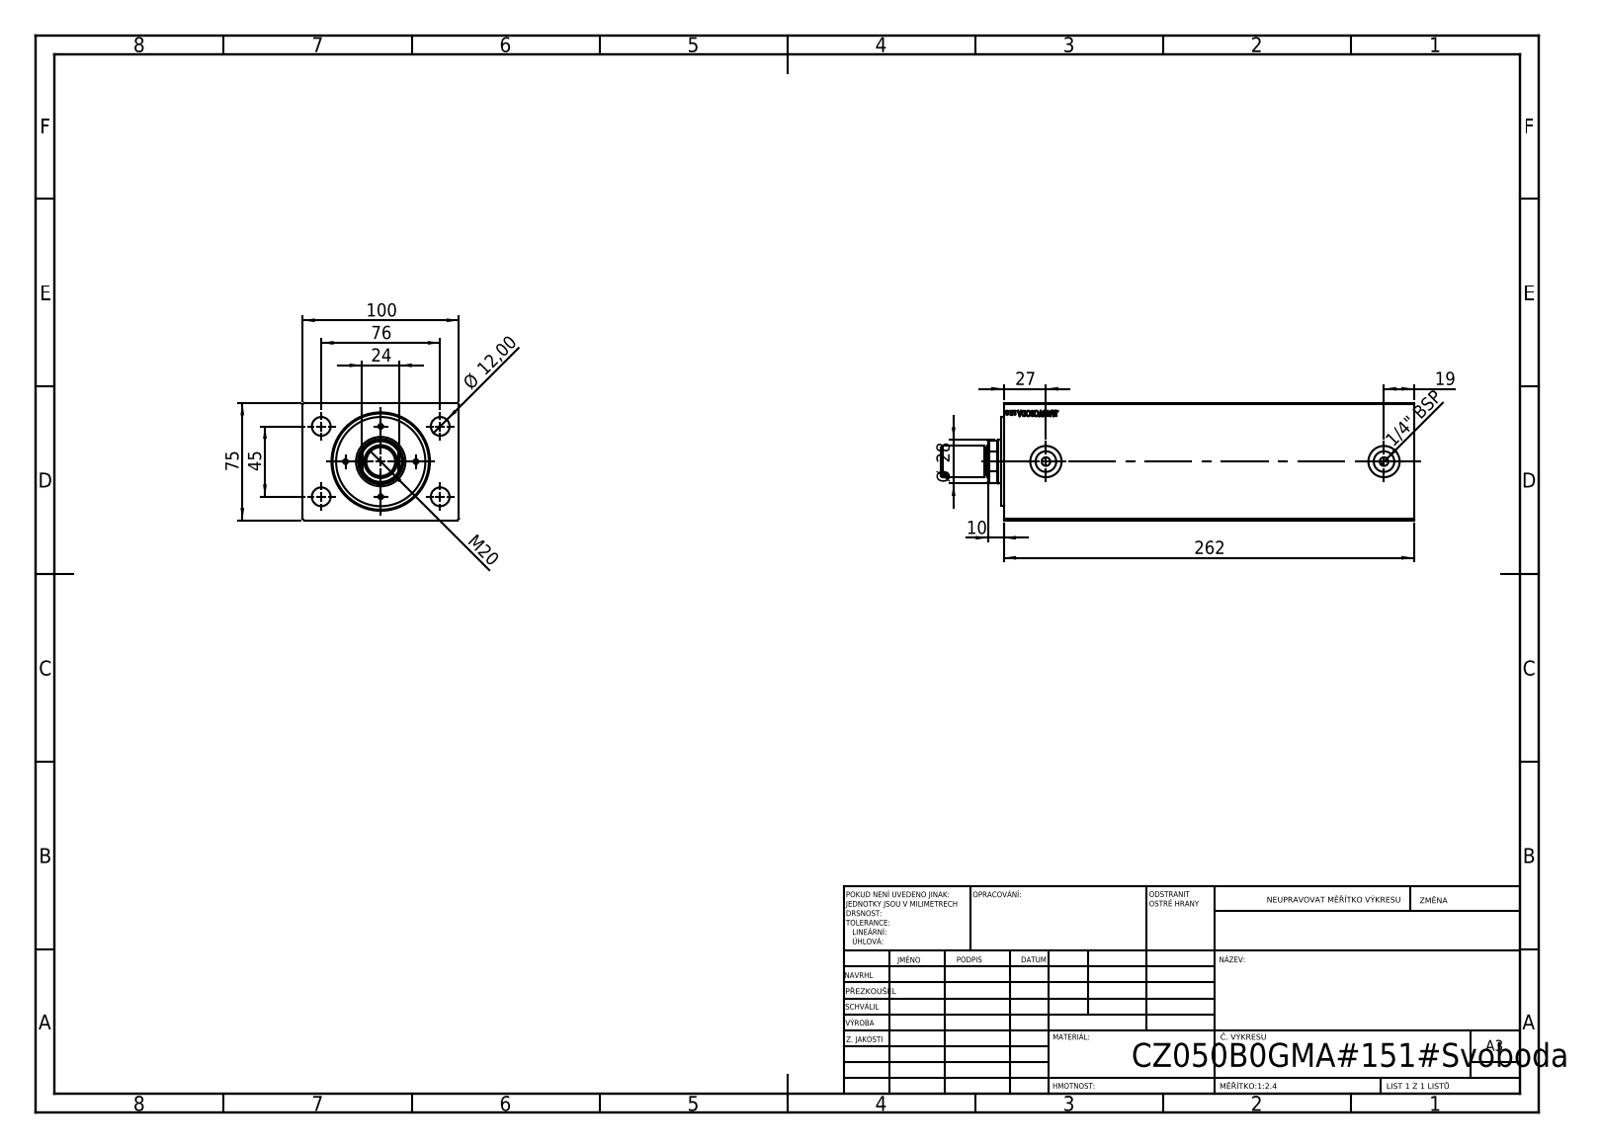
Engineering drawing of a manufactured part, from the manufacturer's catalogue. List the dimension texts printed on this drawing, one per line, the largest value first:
262
100
76
75
45
Ø 28
27
24
M20
19
Ø 12,00
10
1/4" BSP
